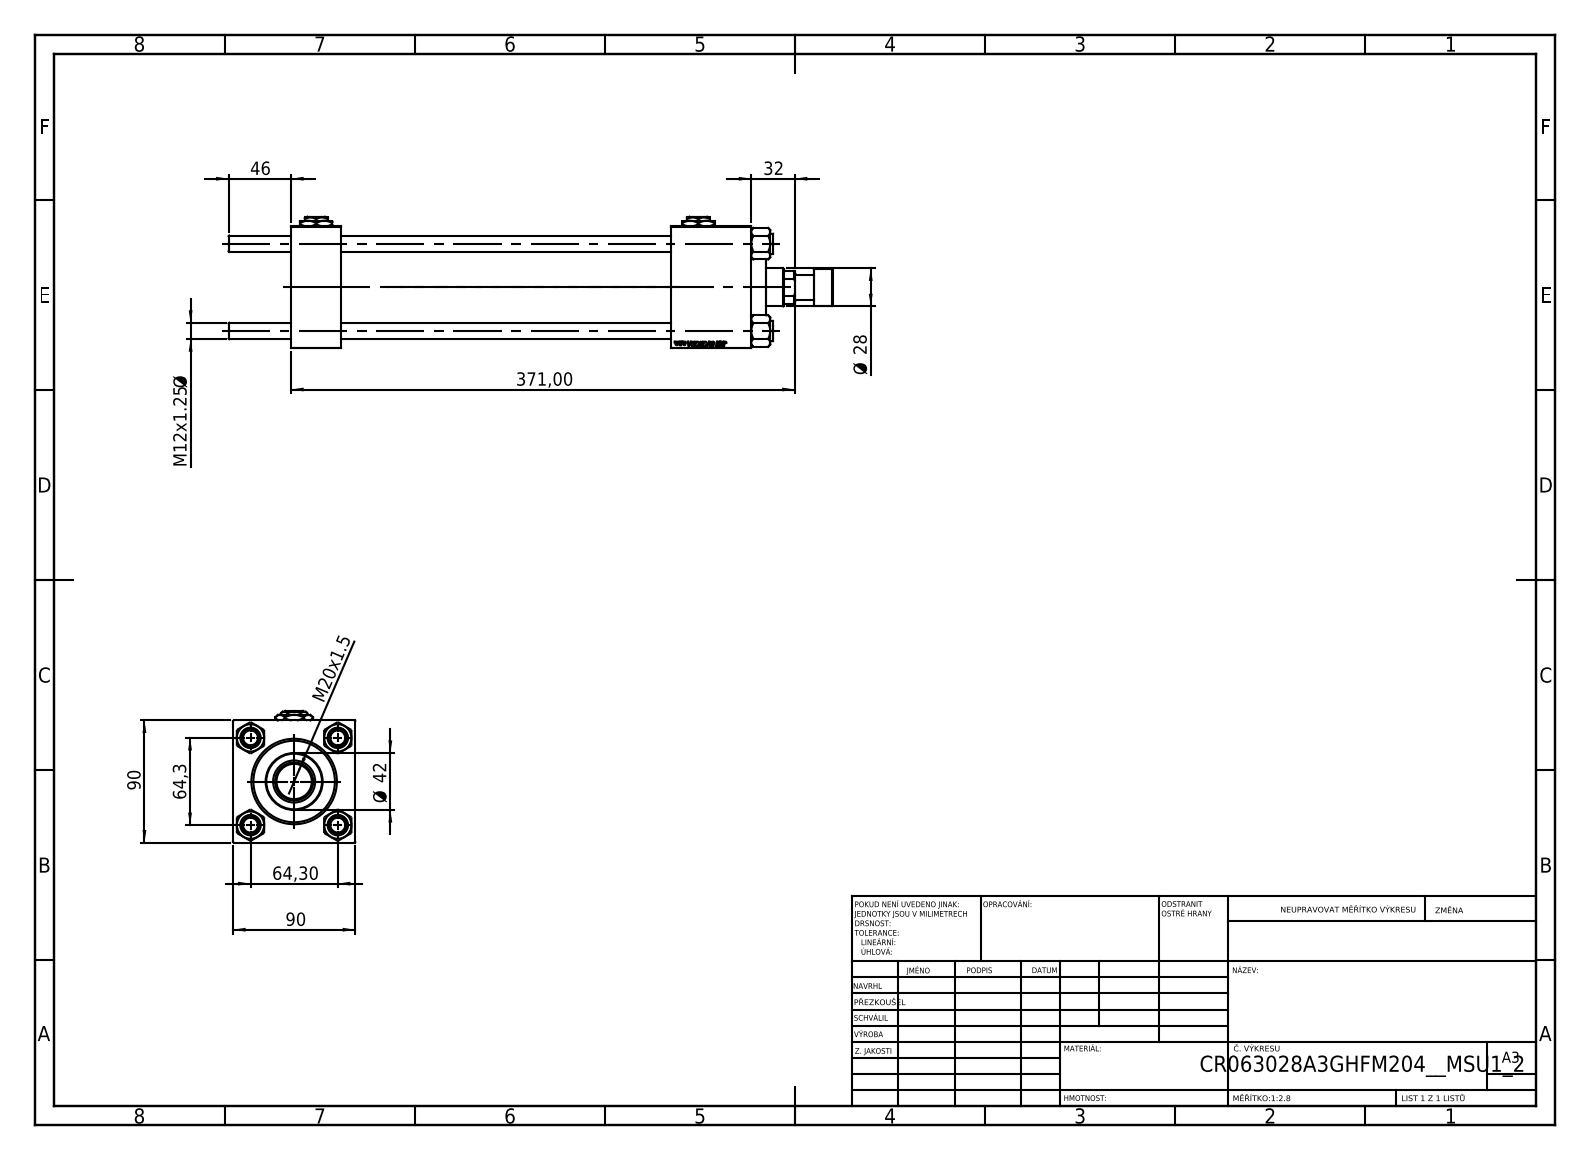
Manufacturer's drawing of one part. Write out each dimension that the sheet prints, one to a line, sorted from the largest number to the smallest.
371,00
90
90
64,3
64,30
46
Ø 42
32
Ø 28
M20x1.5
M12x1.25 Ø
